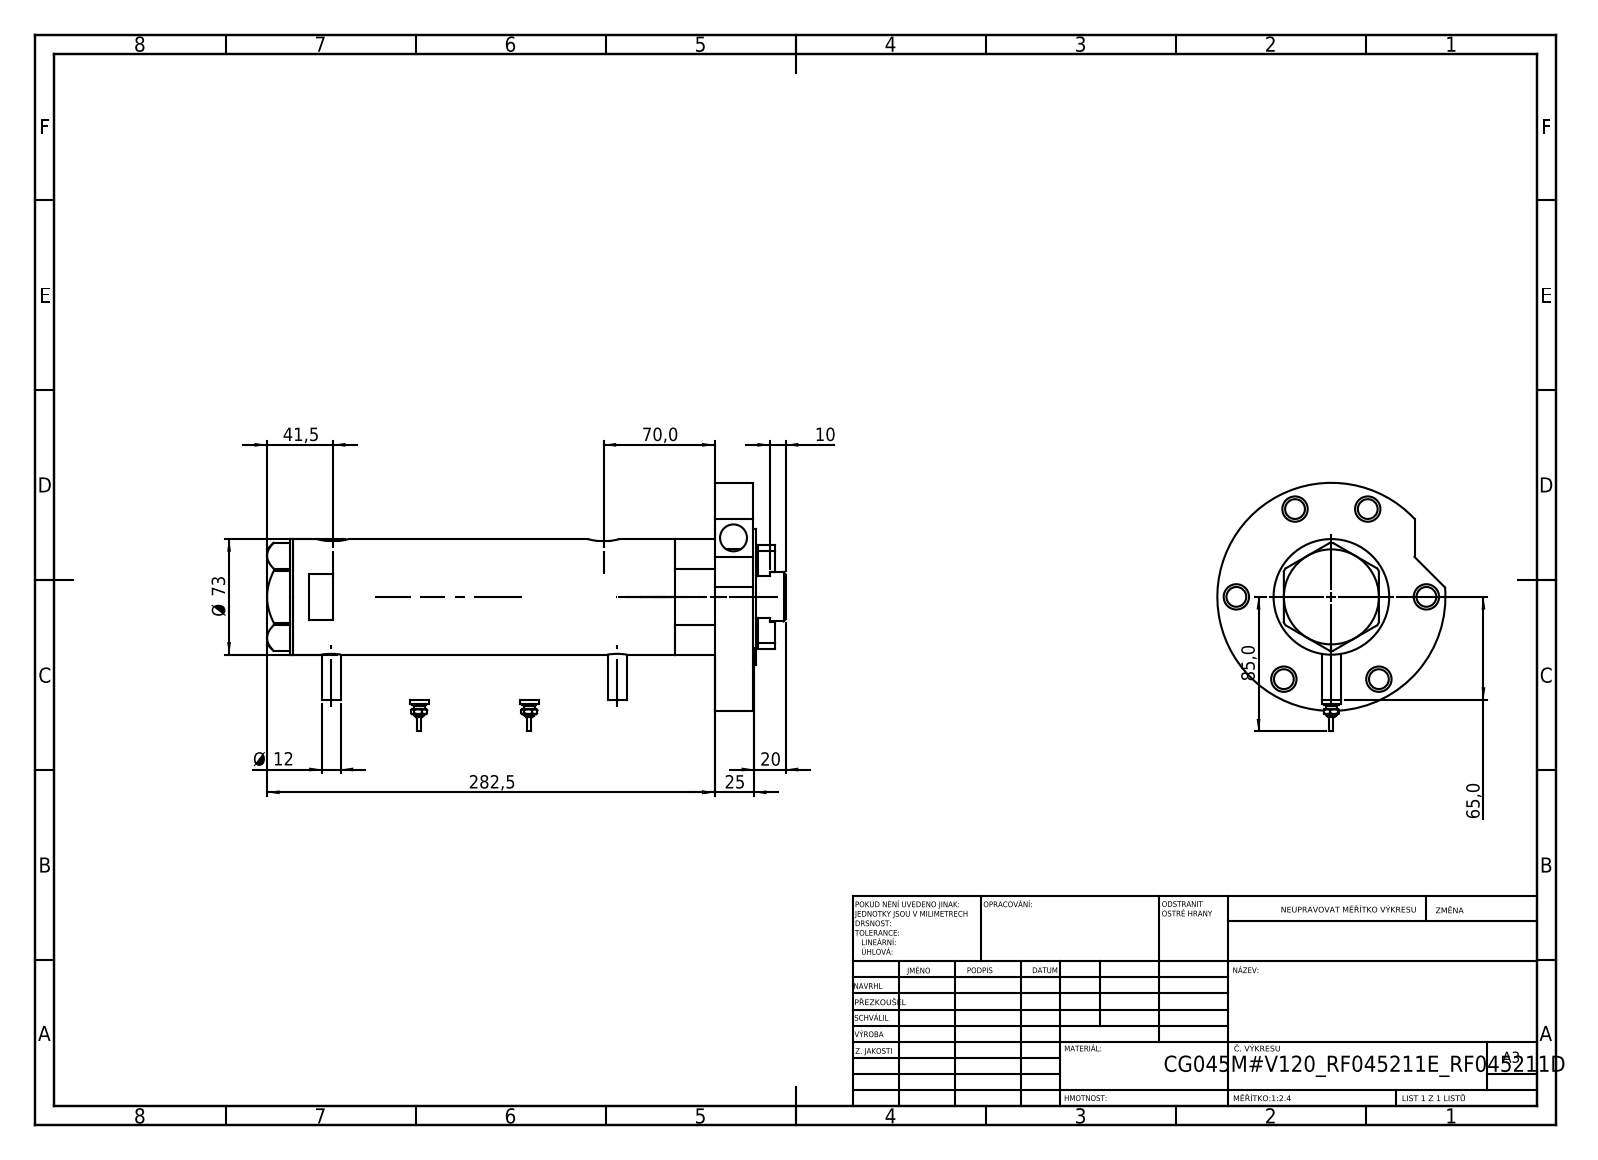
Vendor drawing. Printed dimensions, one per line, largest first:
282,5
85,0
Ø 73
70,0
65,0
41,5
25
20
Ø 12
10
